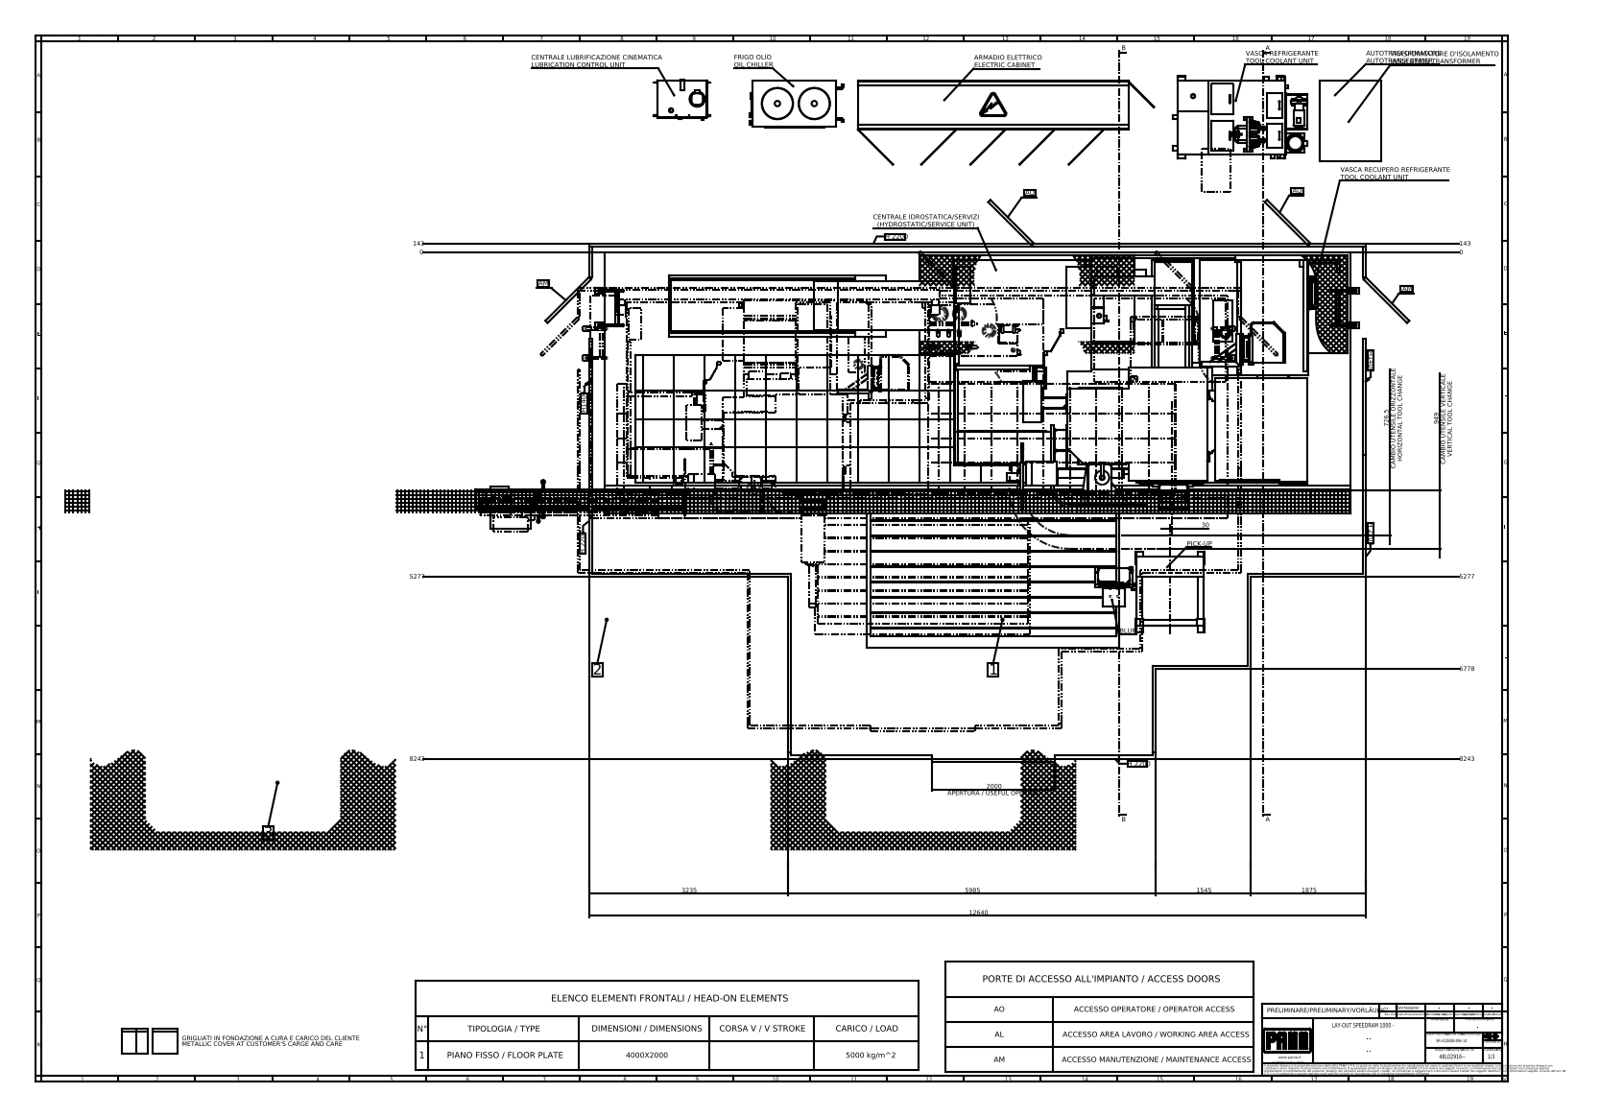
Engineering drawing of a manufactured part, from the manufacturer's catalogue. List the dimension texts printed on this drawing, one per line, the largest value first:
12640
8243
8243
6778
5985
5277
5277
3235
2000 APERTURA / USEFUL OPENING
1875
1545
949 CAMBIO UTENSILE VERTICALE VERTICAL TOOL CHANGE
726,5 CAMBIO UTENSILE ORIZZONTALE HORIZONTAL TOOL CHANGE
143
143
30
0
0
